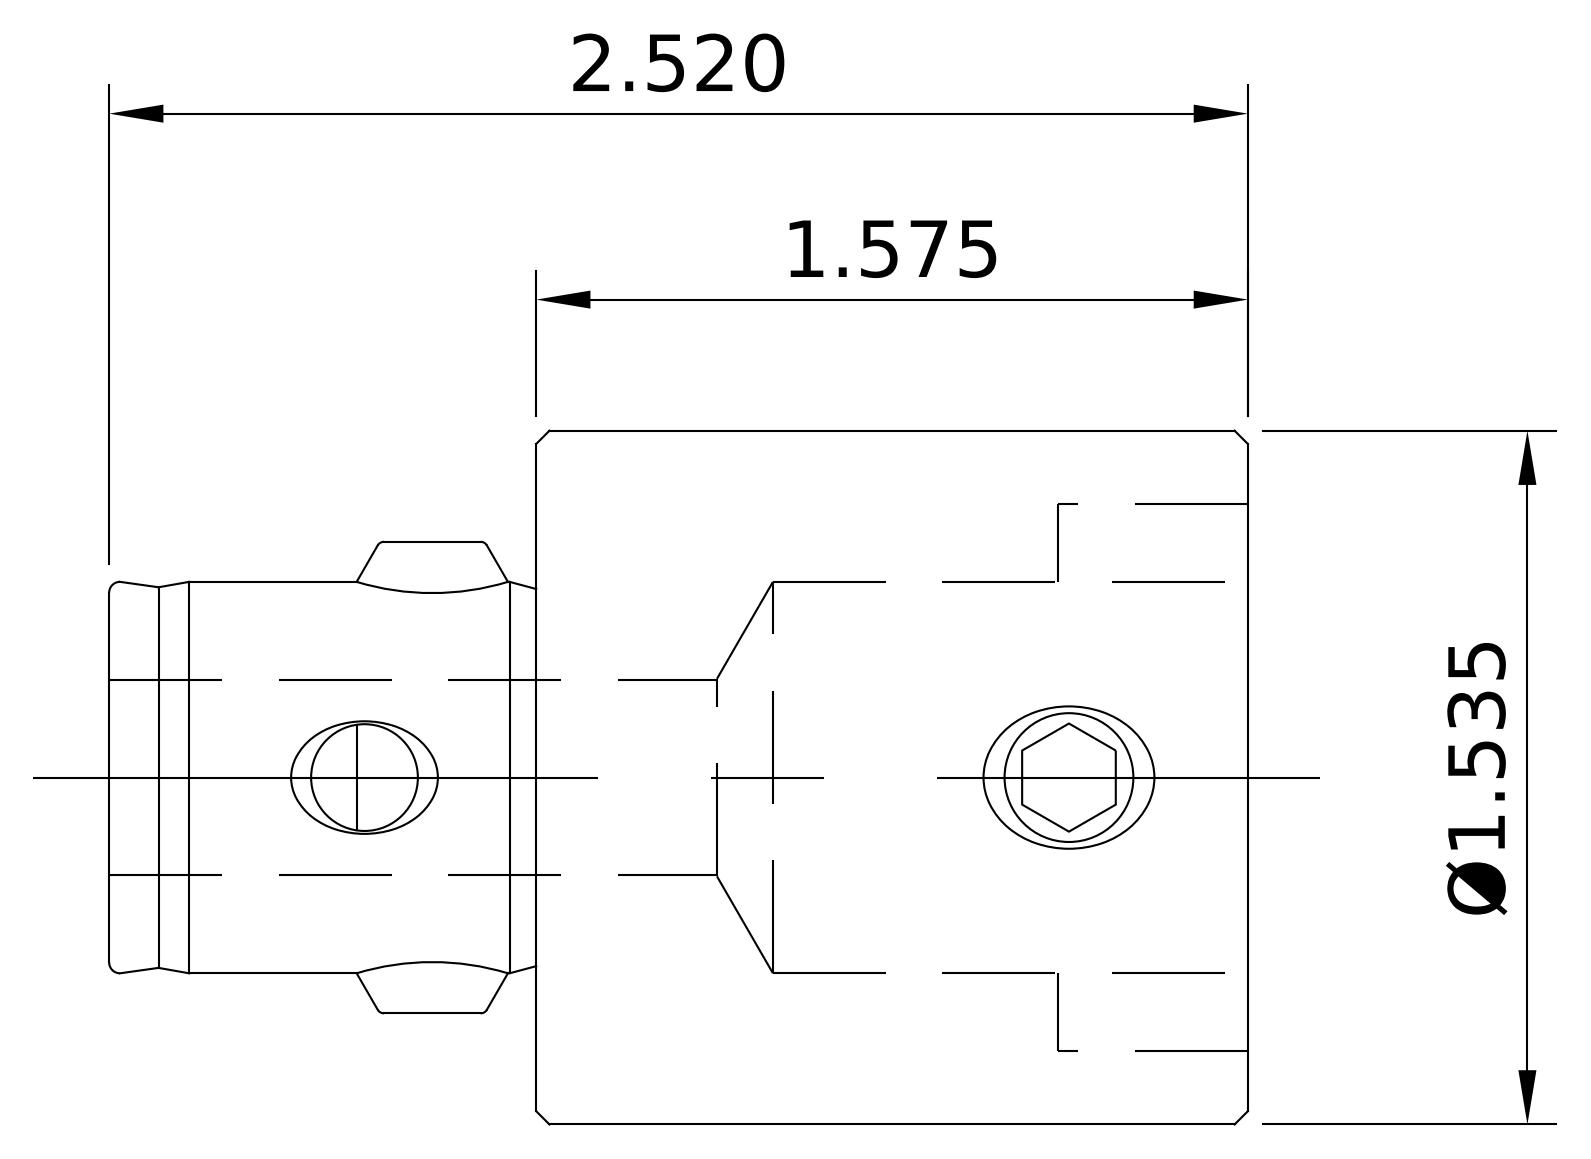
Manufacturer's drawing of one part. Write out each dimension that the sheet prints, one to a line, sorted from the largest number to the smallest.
2.520
1.575
Ø1.535
